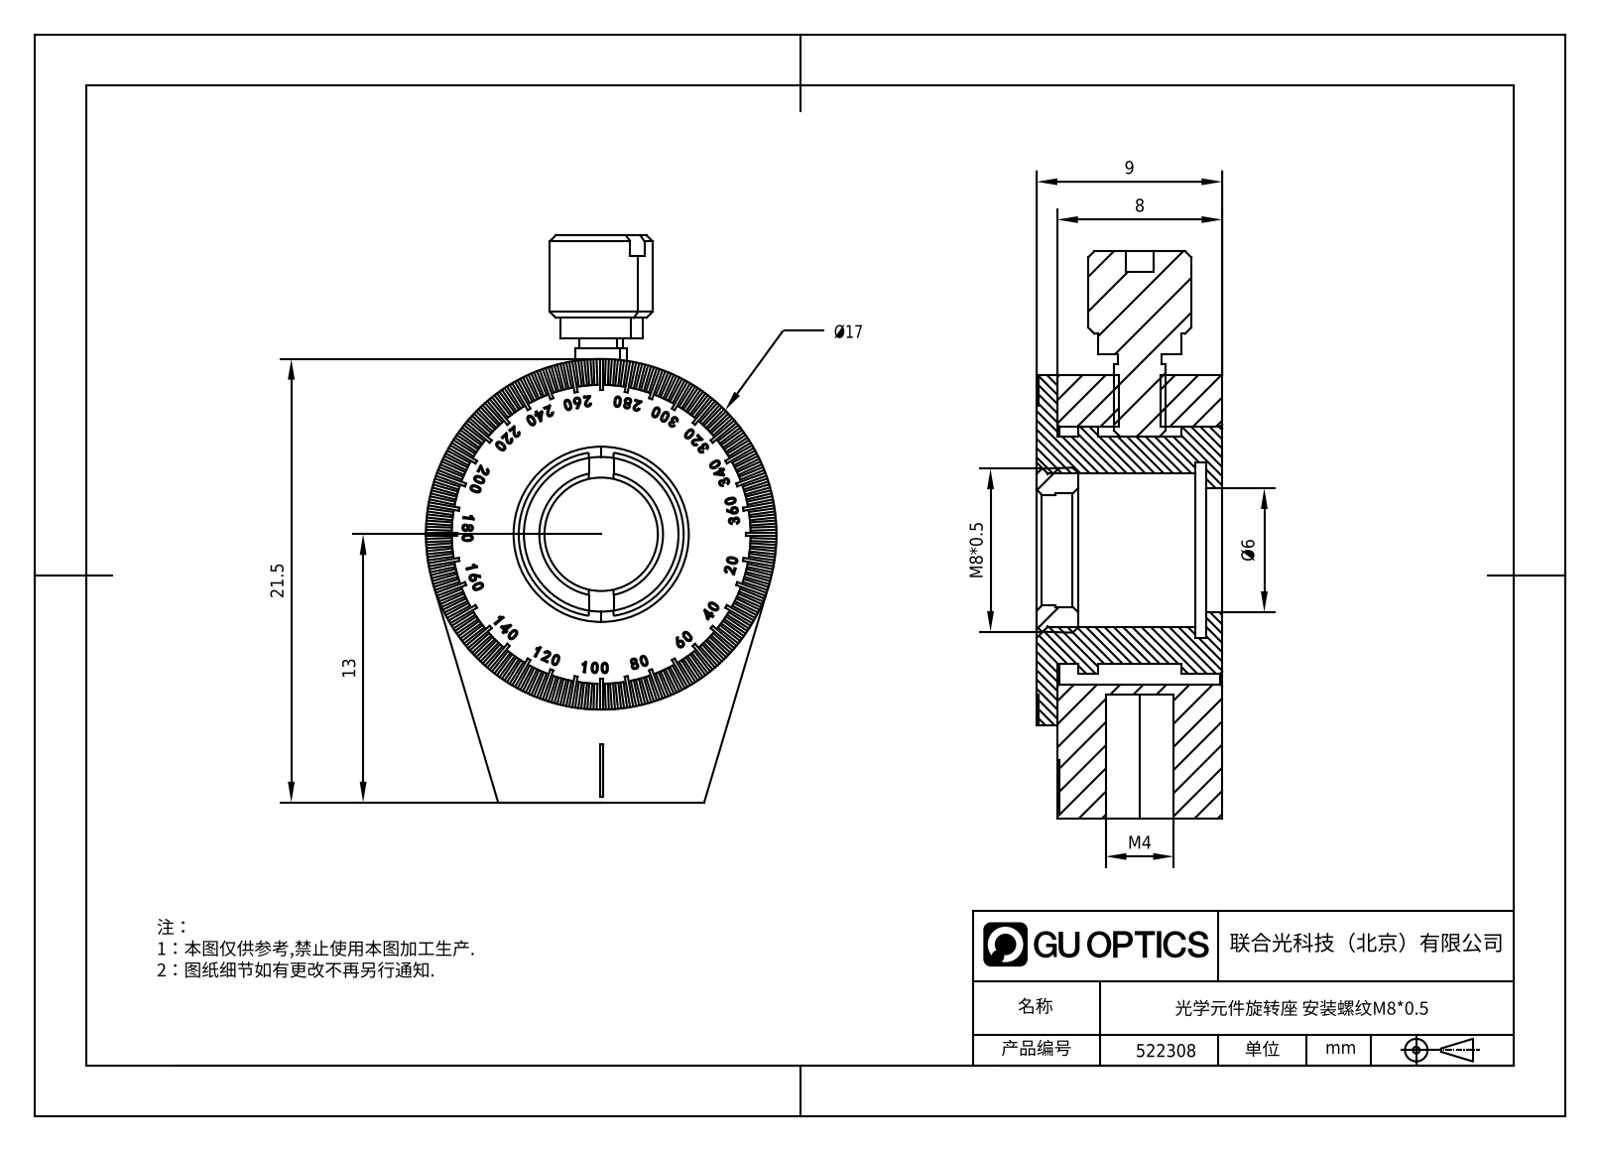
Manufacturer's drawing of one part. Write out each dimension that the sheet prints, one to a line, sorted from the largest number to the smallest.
21.5
13
9
M8*0.5
8
Ø6
M4
